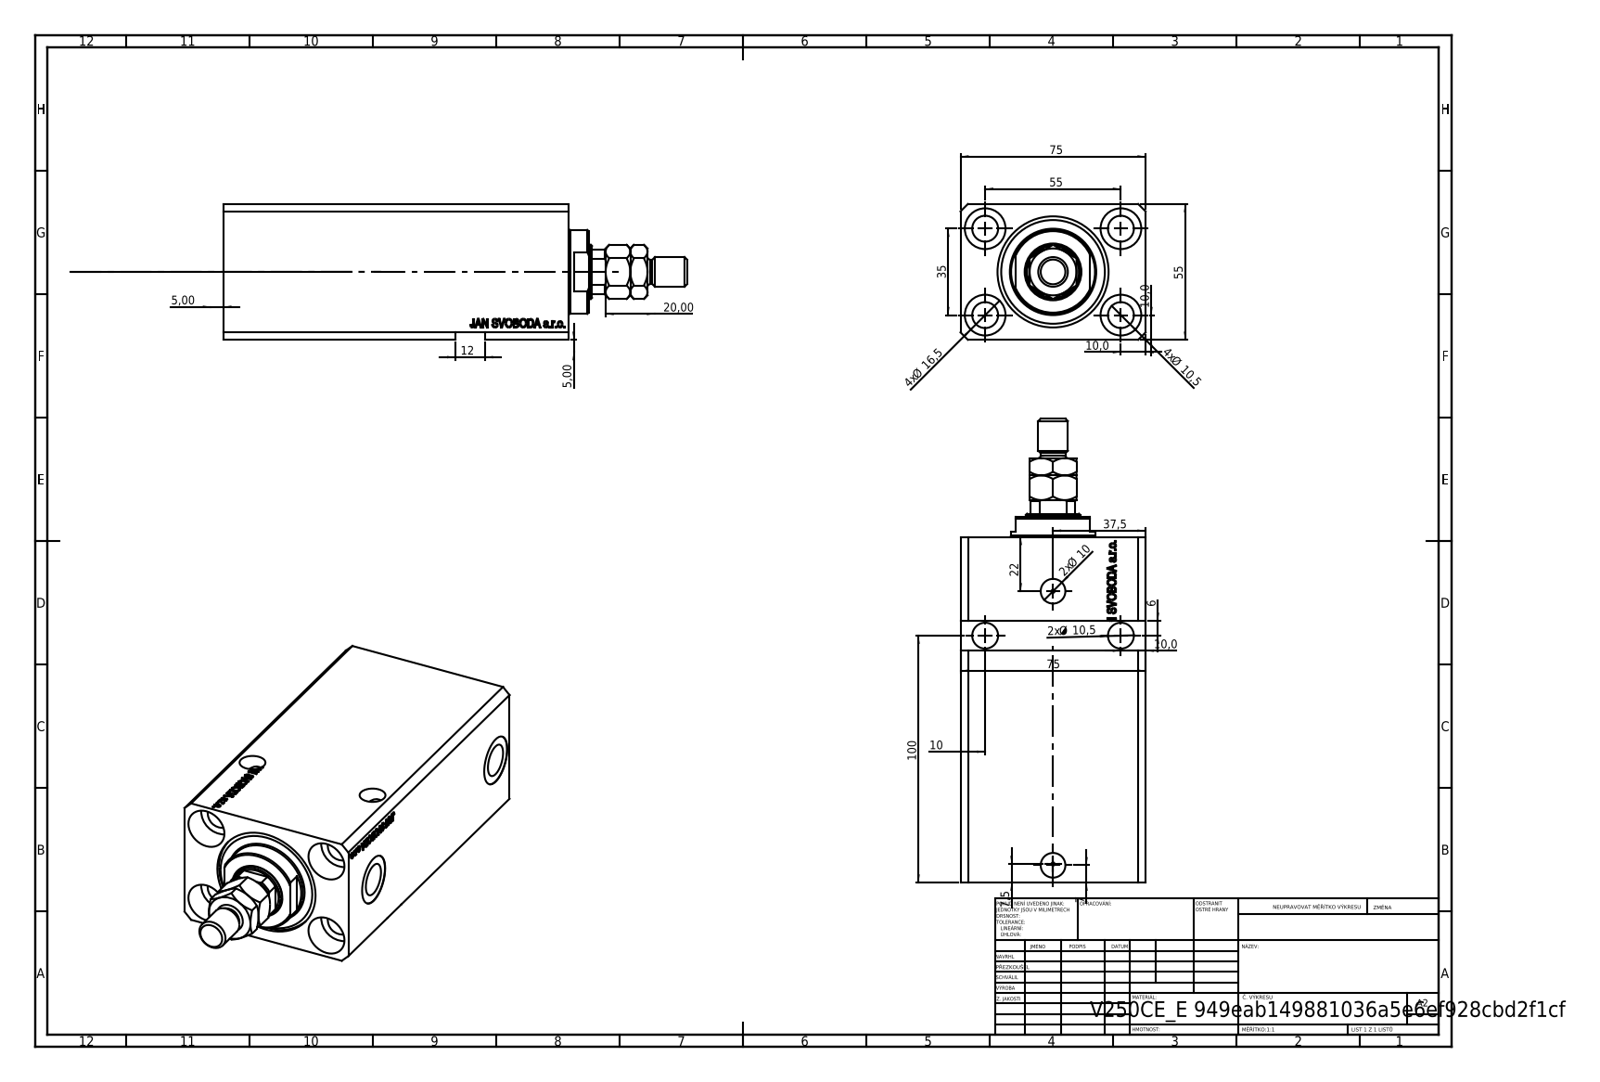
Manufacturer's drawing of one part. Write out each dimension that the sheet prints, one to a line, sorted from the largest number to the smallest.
100
75
75
55
55
37,5
35
22
20,00
4x Ø 16,5
12
4x Ø 10,5
2x Ø 10,5
10,0
10,0
2x Ø 10
10,0
10
7,5
7
6
5,00
5,00
